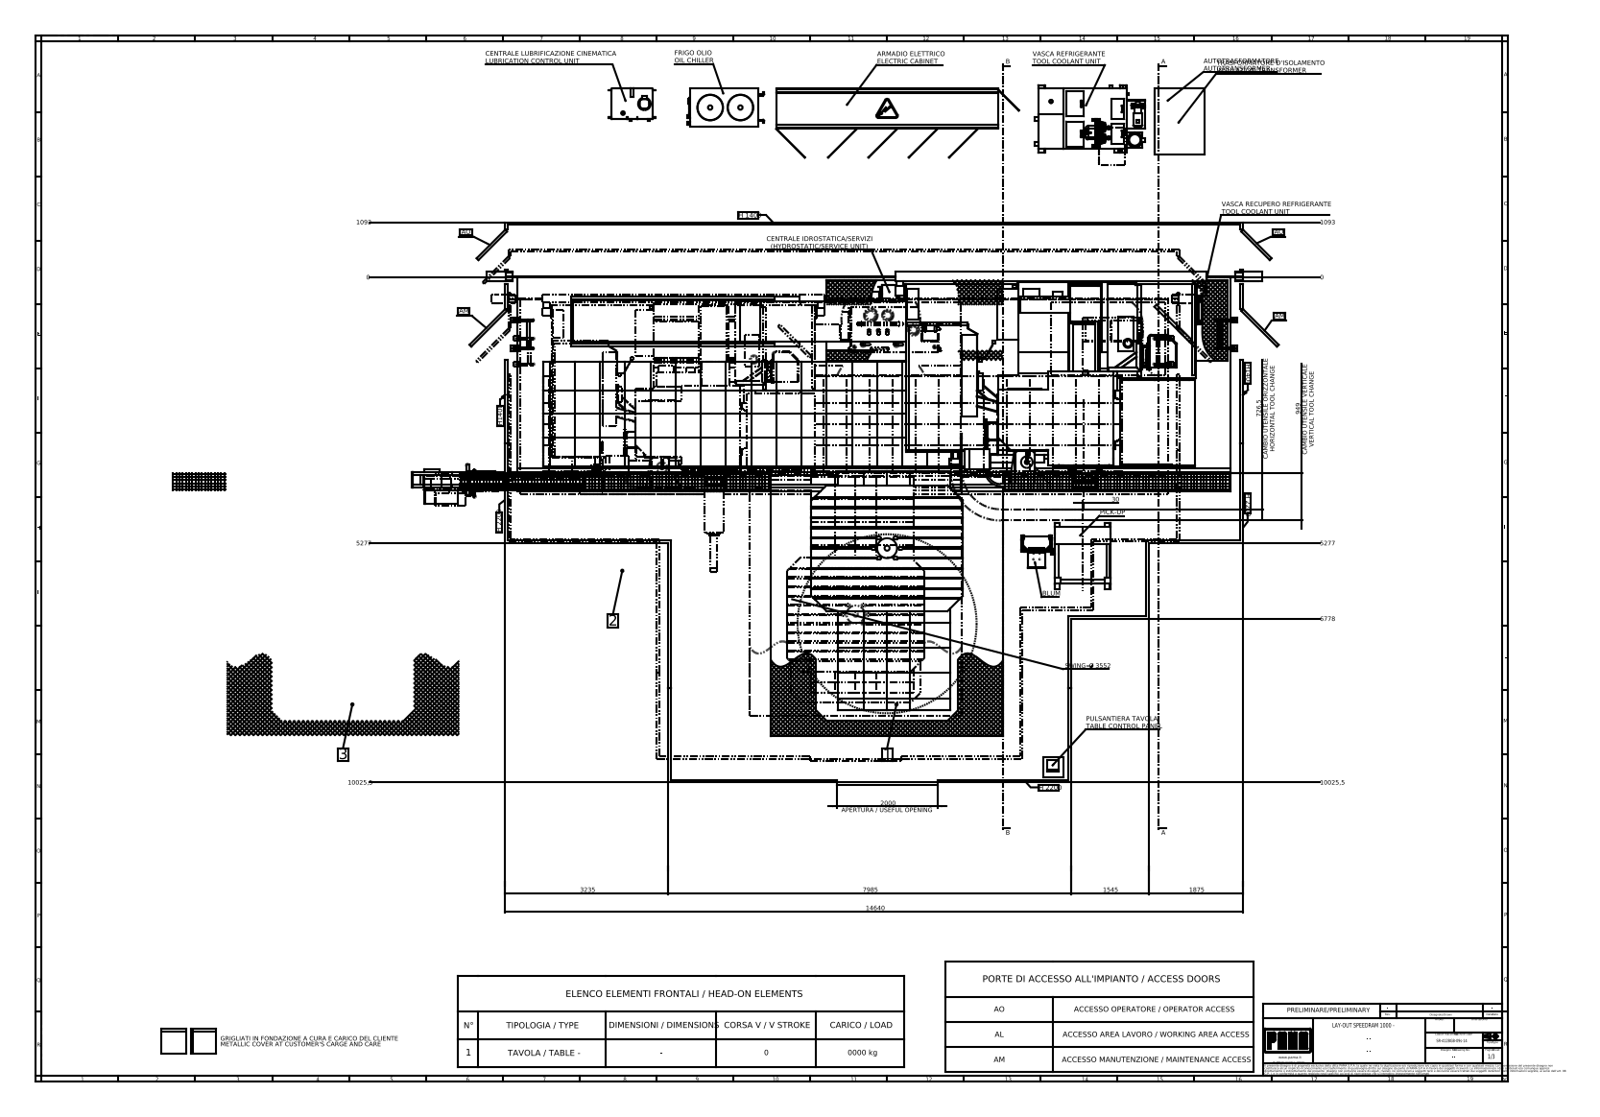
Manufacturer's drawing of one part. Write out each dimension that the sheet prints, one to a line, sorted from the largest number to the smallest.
14640
10025,5
10025,5
7985
6778
5277
5277
SWING= Ø 3552
3235
2000 APERTURA / USEFUL OPENING
1875
1545
1093
1093
949 CAMBIO UTENSILE VERTICALE VERTICAL TOOL CHANGE
726,5 CAMBIO UTENSILE ORIZZONTALE HORIZONTAL TOOL CHANGE
30
0
0
